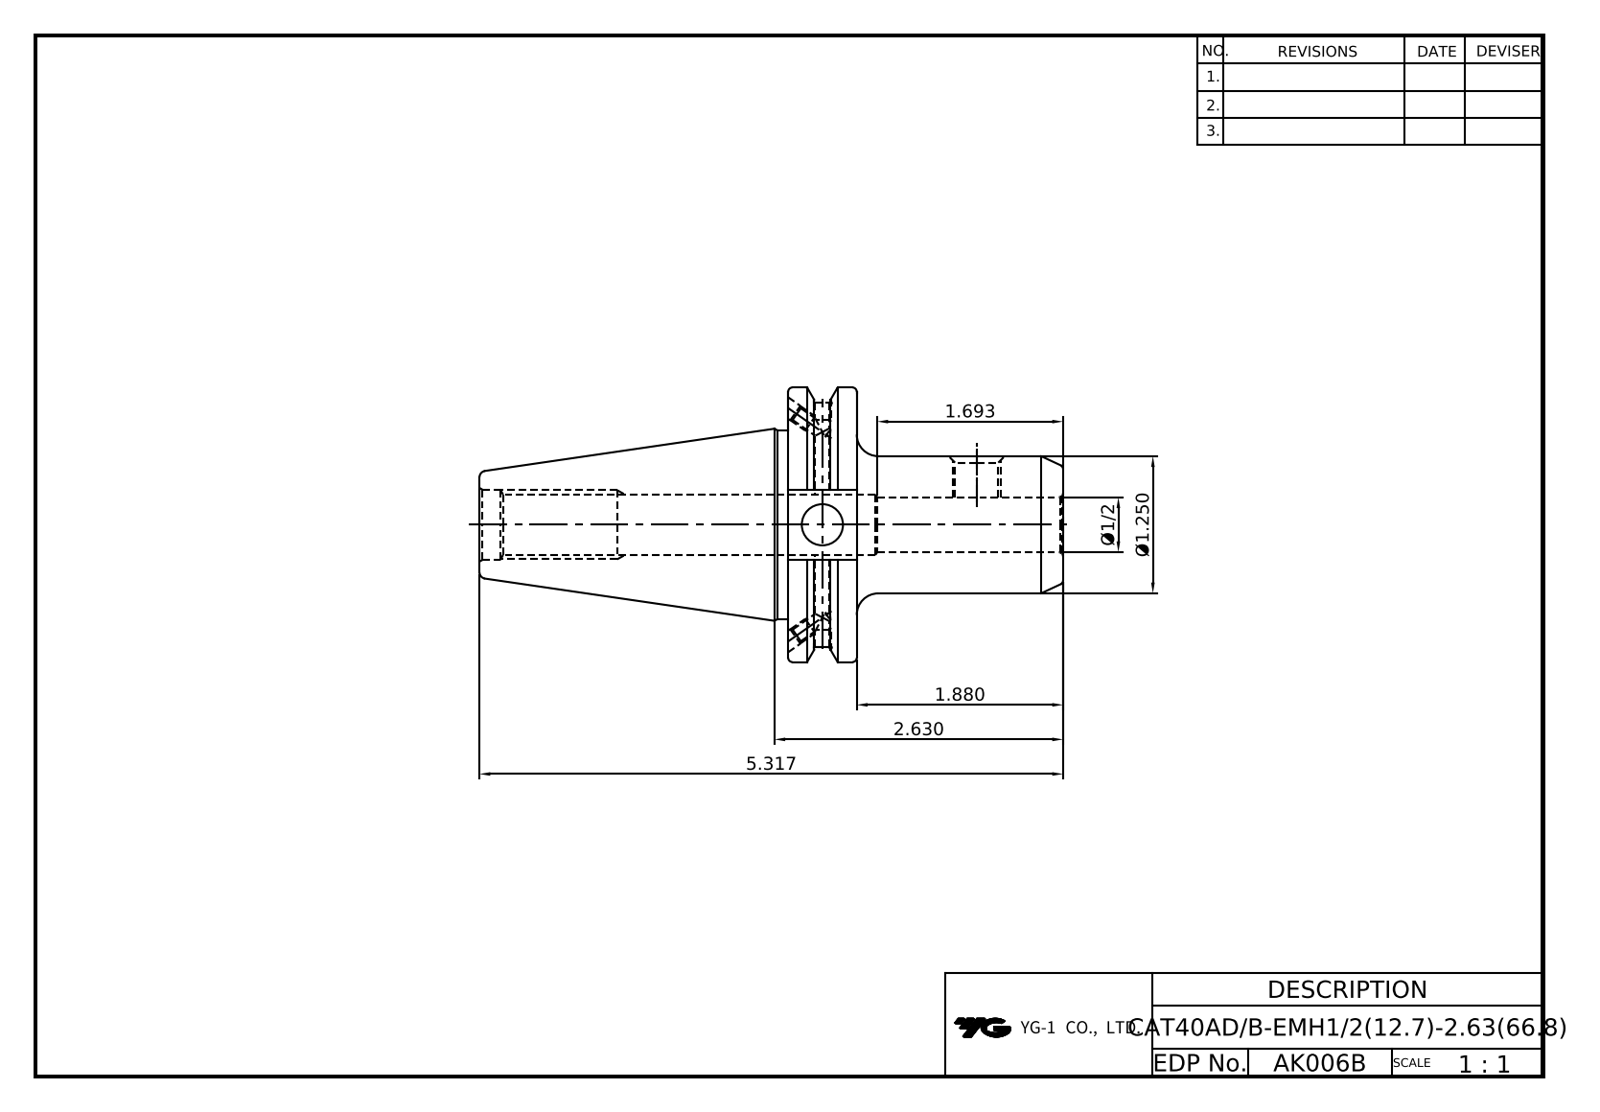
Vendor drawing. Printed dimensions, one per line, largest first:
5.317
2.630
1.880
1.693
Ø1.250
Ø1/2
